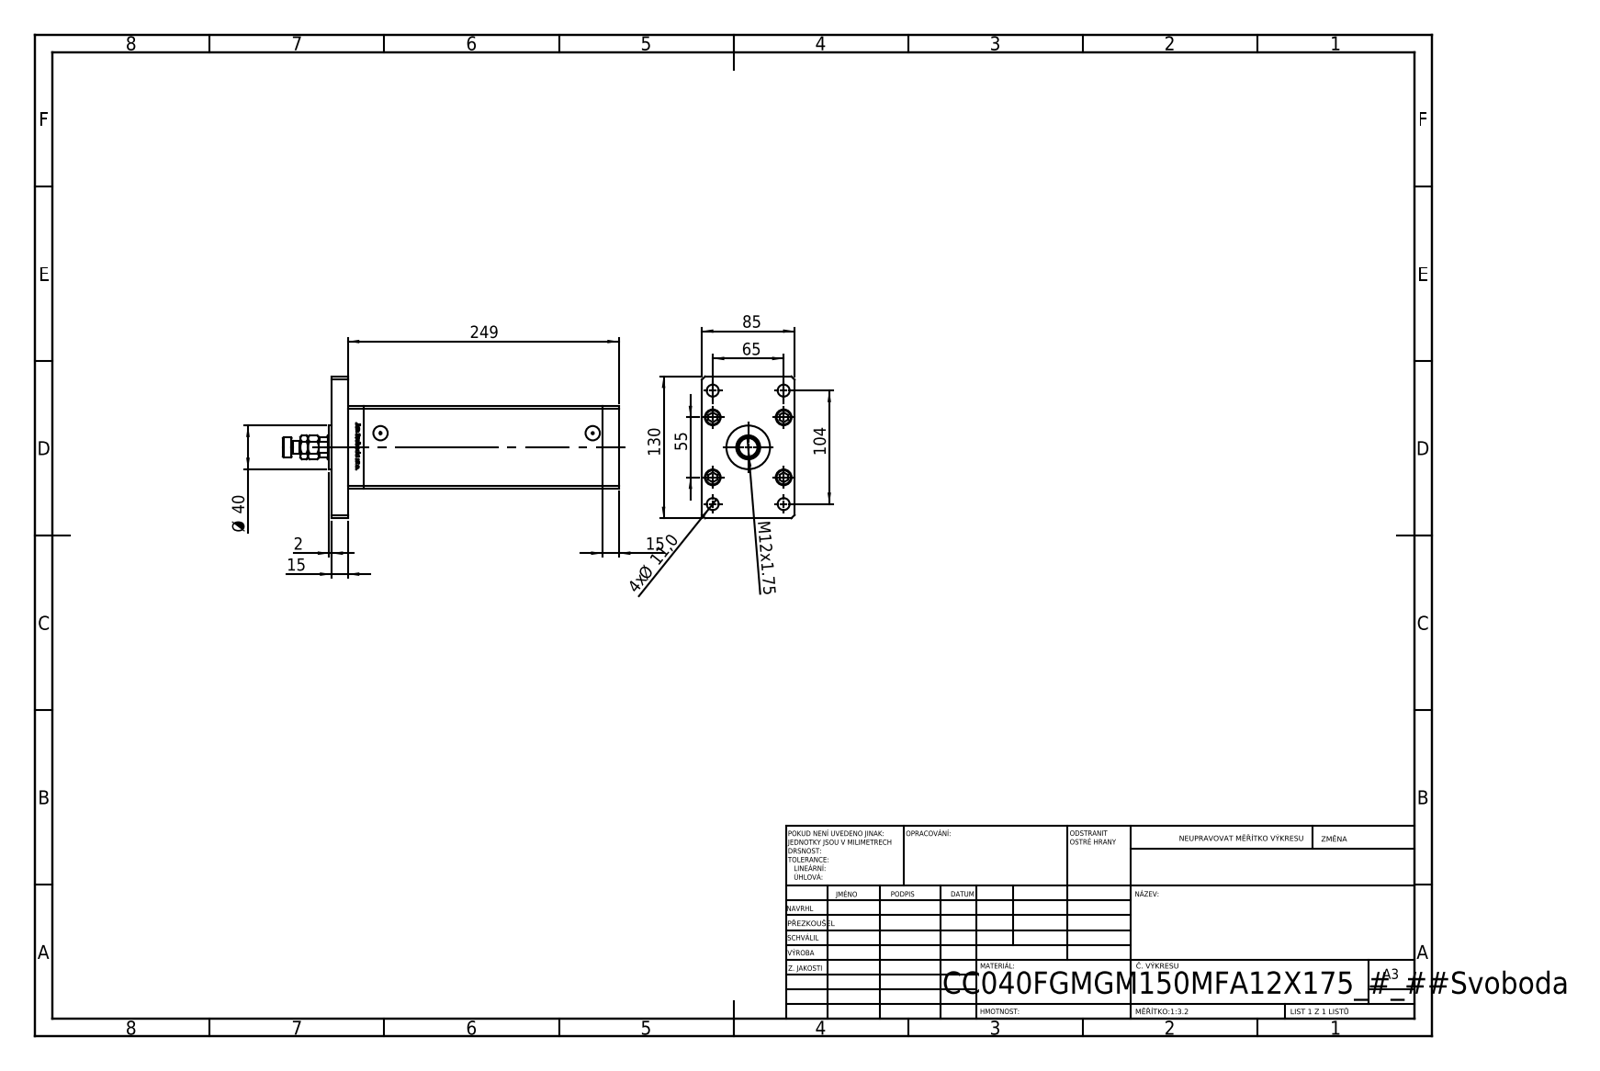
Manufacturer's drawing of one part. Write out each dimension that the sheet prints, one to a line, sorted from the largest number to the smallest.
249
130
104
85
65
55
Ø 40
15
15
M12x1.75
4x Ø 11,0
2
